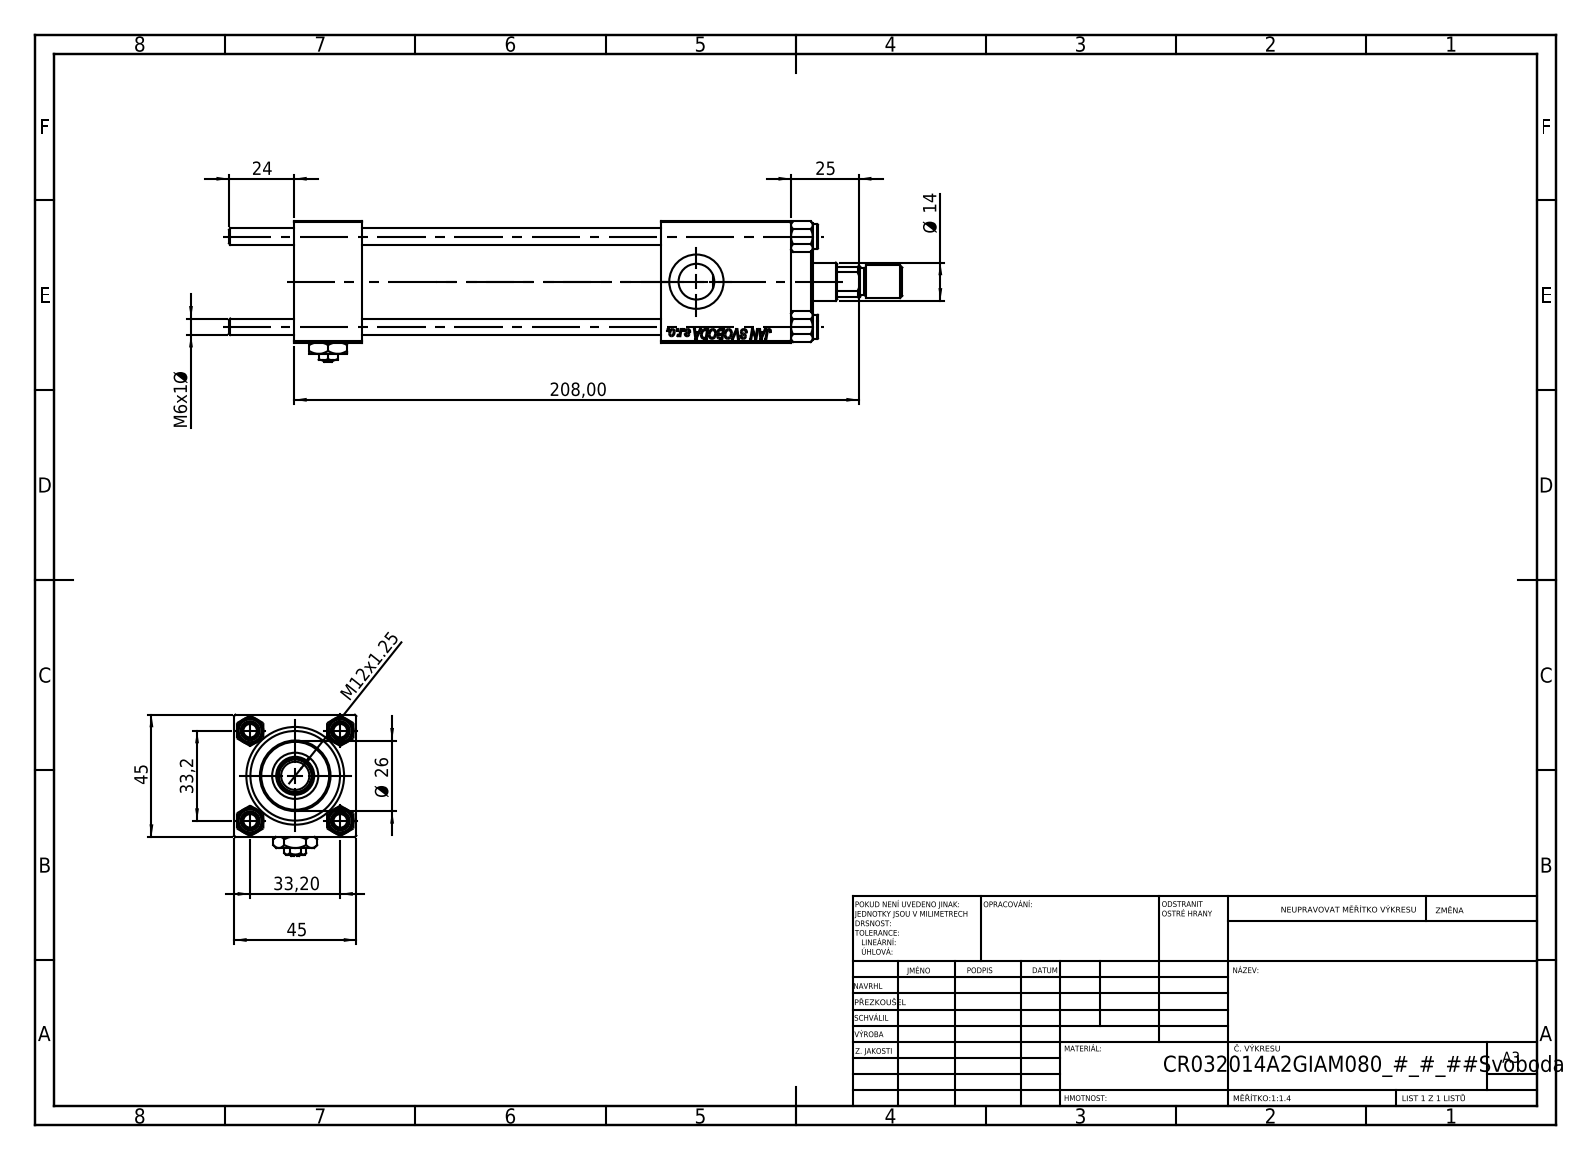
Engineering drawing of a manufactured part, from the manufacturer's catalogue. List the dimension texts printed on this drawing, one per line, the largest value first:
208,00
45
45
33,2
33,20
Ø 26
25
24
Ø 14
M12x1.25
M6x1 Ø
